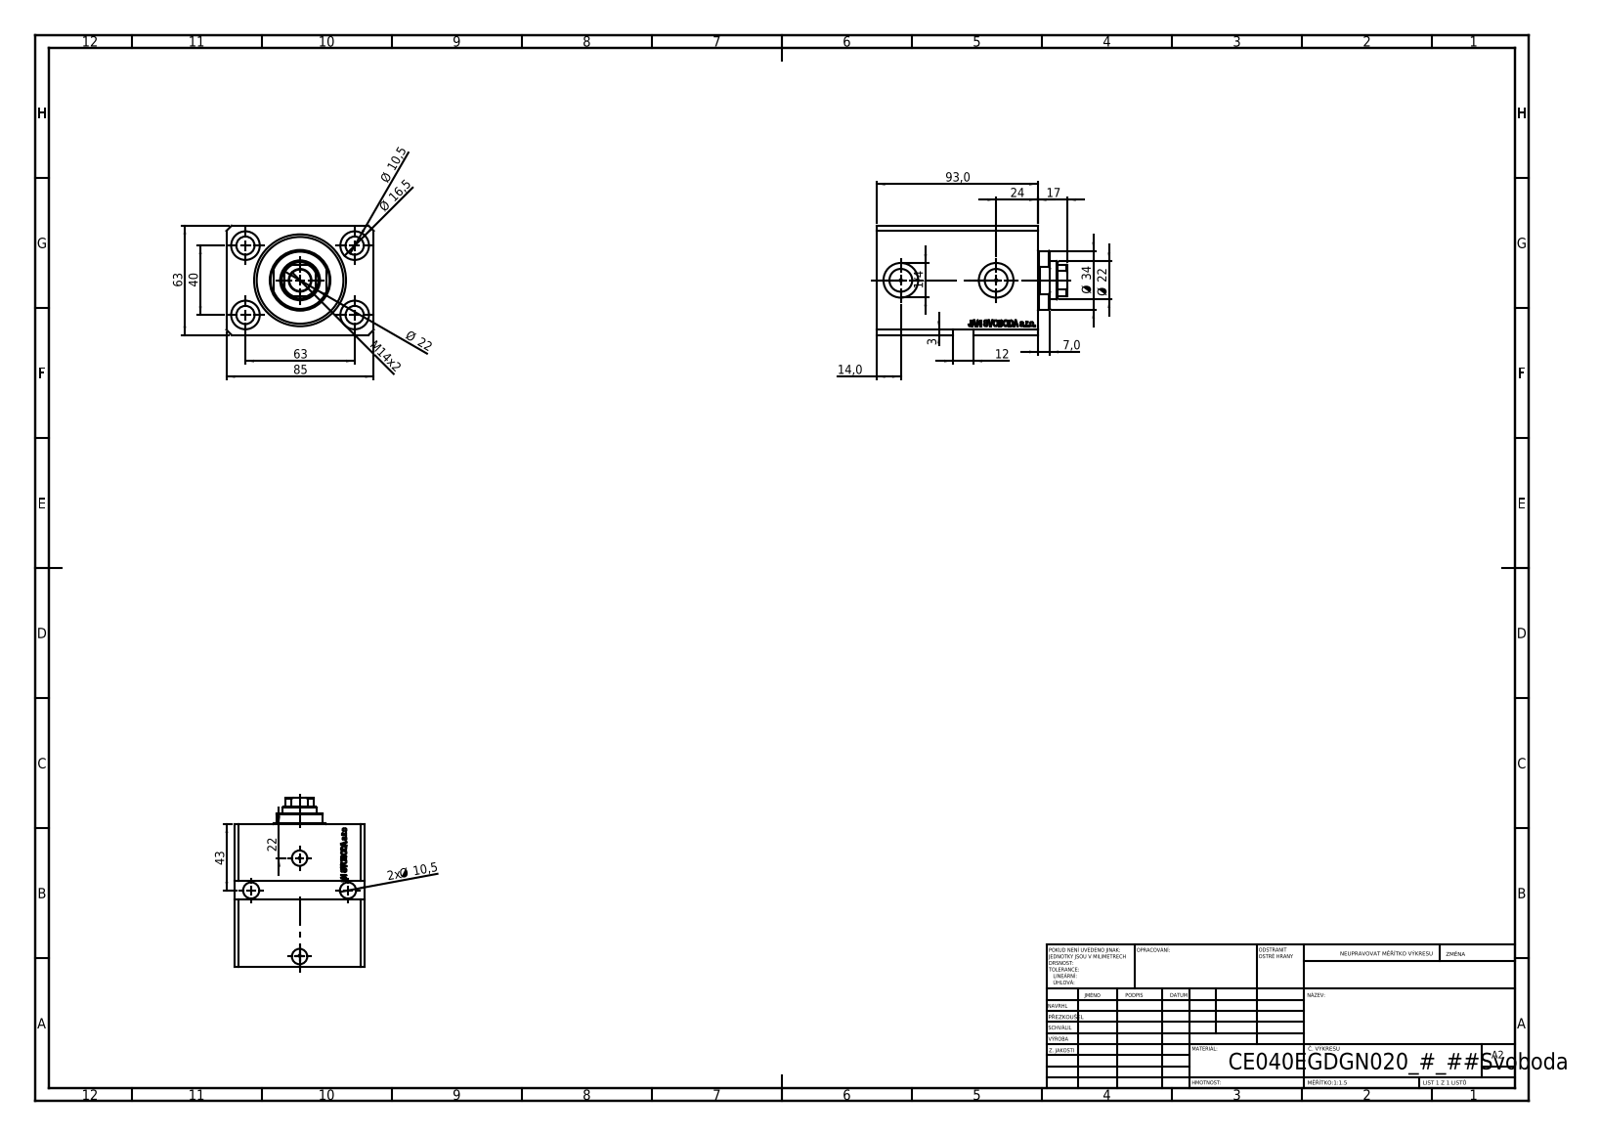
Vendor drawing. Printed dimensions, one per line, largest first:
93,0
85
63
63
43
40
Ø 34
24
Ø 22
Ø 22
22
17
Ø 16,5
M14x2
14,0
12
Ø 10,5
2x Ø 10,5
7,0
3
1/4
